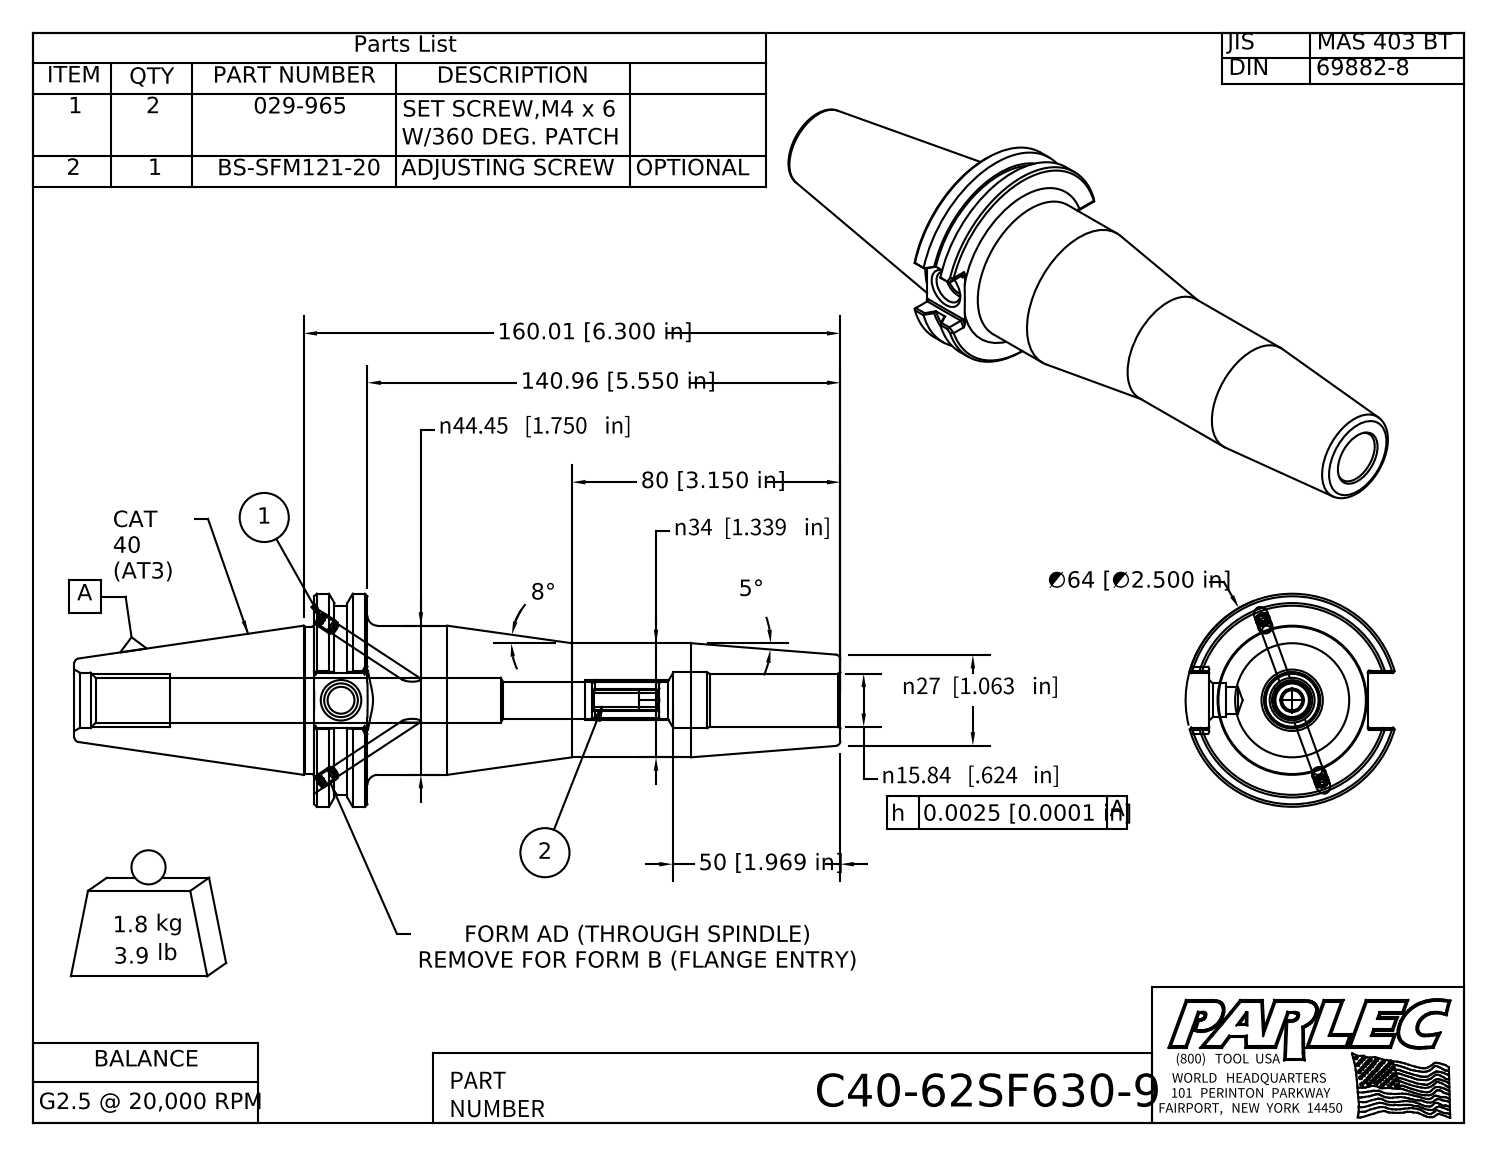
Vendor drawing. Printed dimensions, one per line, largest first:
160.01 [6.300 in]
140.96 [5.550 in]
80 [3.150 in]
∅64 [∅2.500 in]
50 [1.969 in]
n44.45 [1.750 in]
n34 [1.339 in]
n27 [1.063 in]
n15.84 [.624 in]
8°
5°
